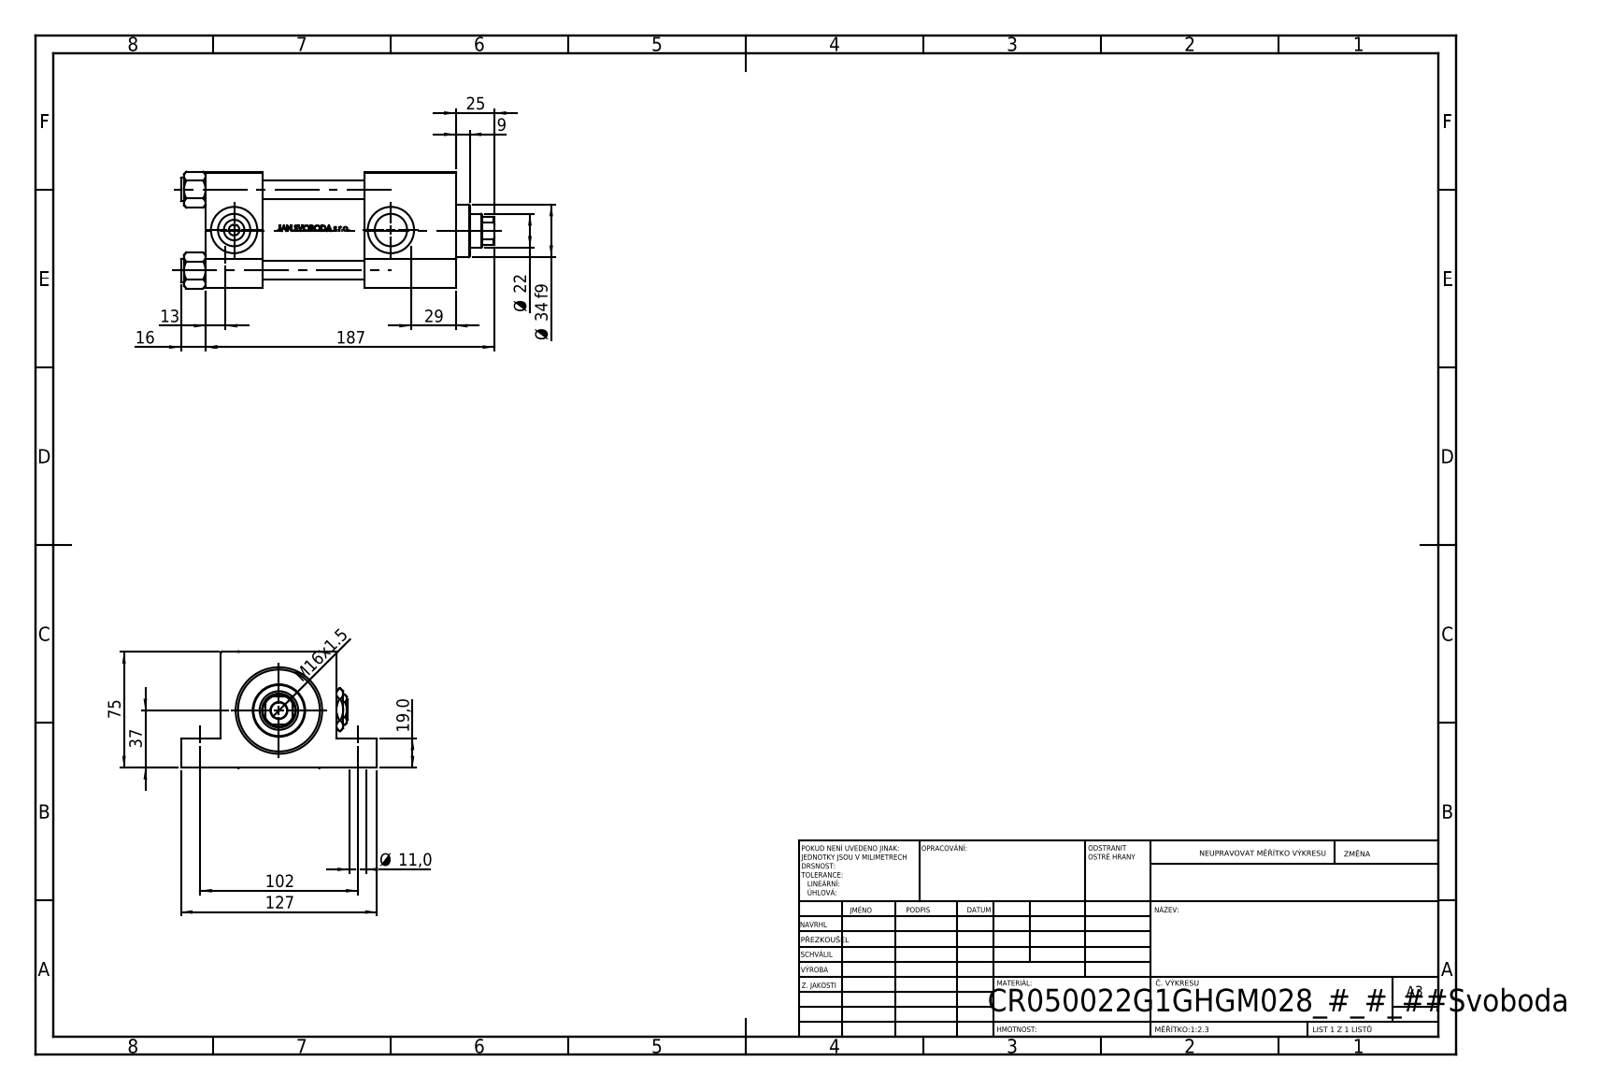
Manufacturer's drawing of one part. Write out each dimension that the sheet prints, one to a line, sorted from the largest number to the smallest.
187
127
102
75
37
Ø 34 f9
29
25
Ø 22
19,0
16
M16x1.5
13
Ø 11,0
9
